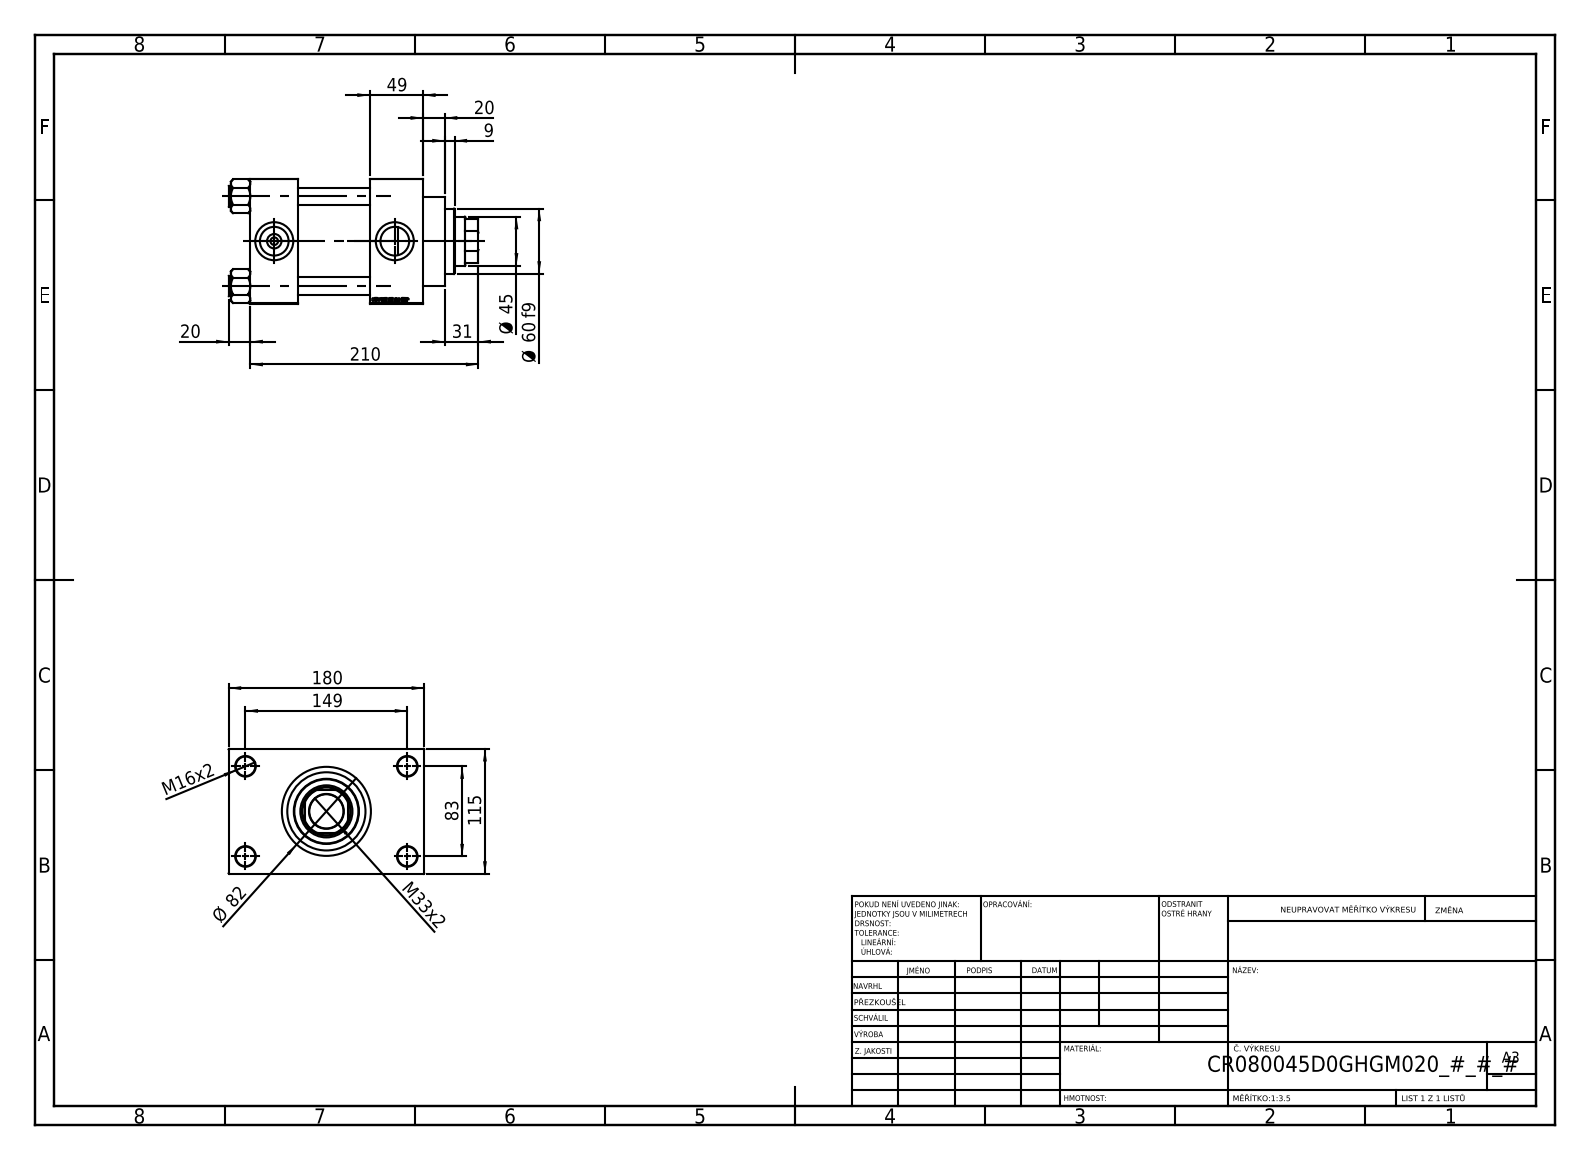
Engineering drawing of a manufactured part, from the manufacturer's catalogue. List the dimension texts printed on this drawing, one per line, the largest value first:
210
180
149
115
83
Ø 82
Ø 60 f9
49
Ø 45
M33x2
31
20
20
M16x2
9
